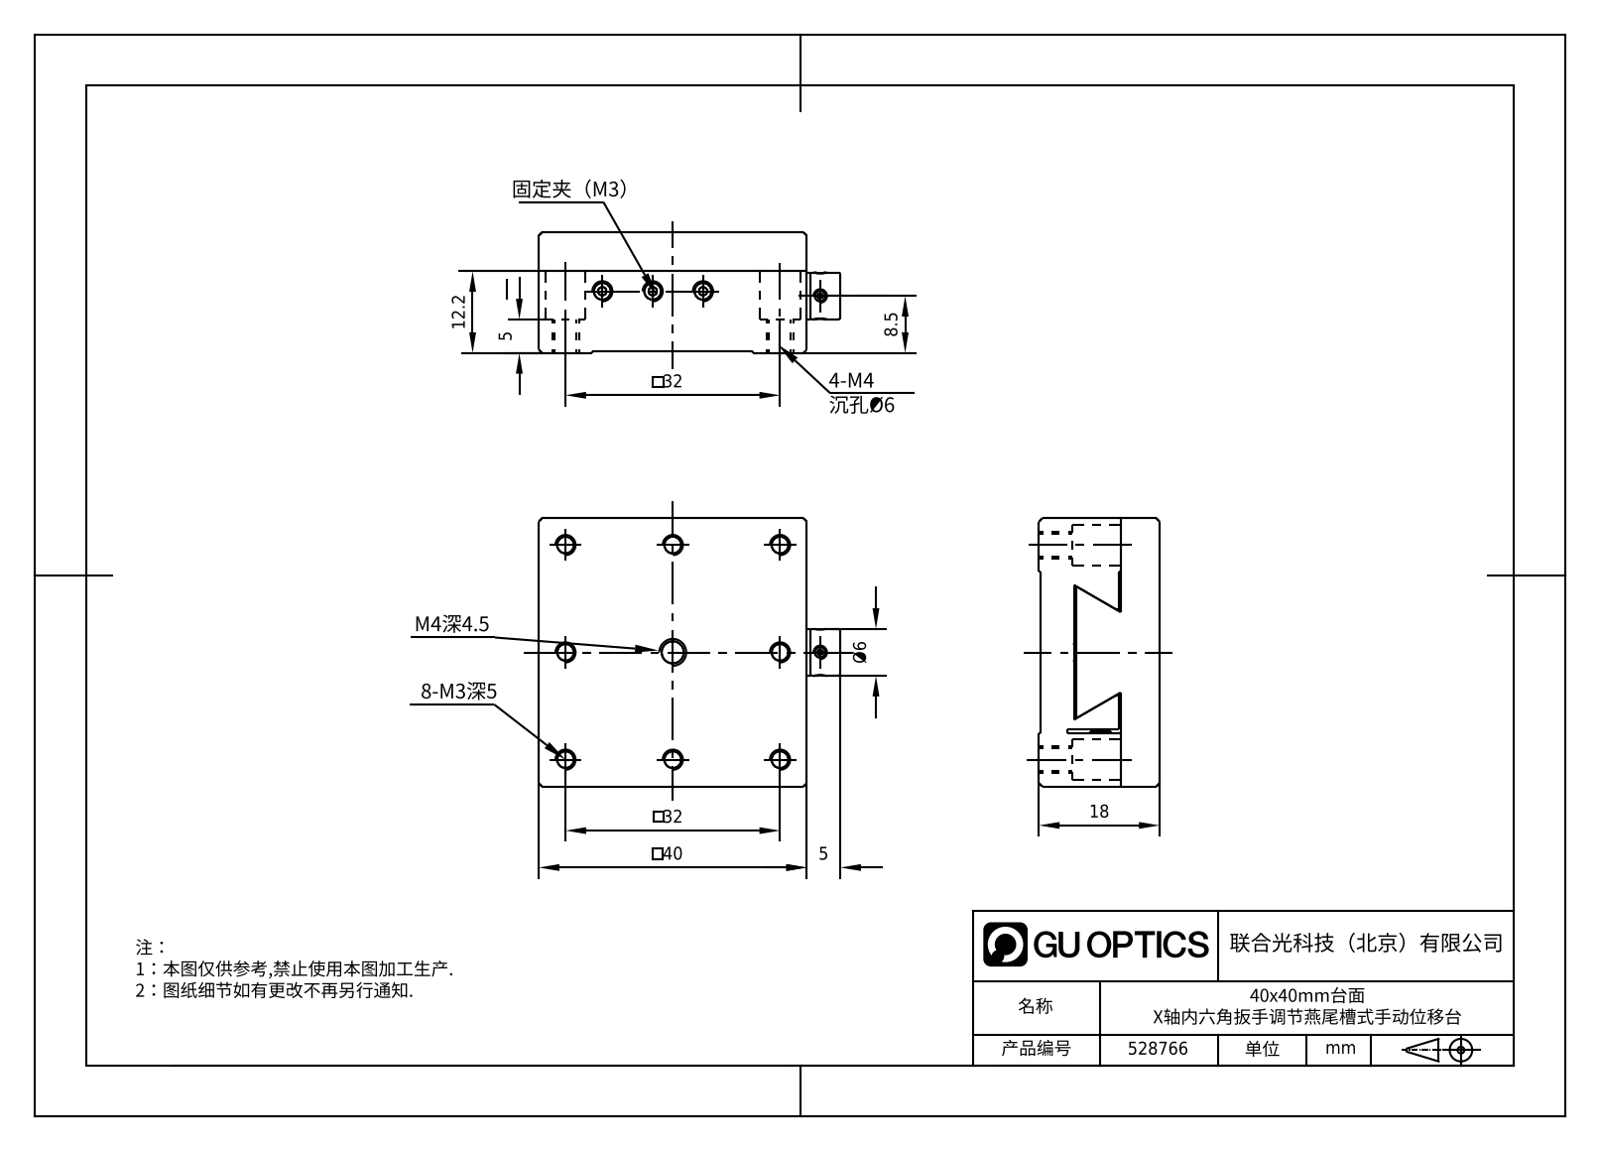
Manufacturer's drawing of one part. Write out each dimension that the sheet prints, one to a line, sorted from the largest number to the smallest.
40
32
32
18
12.2
8.5
Ø6
5
5
